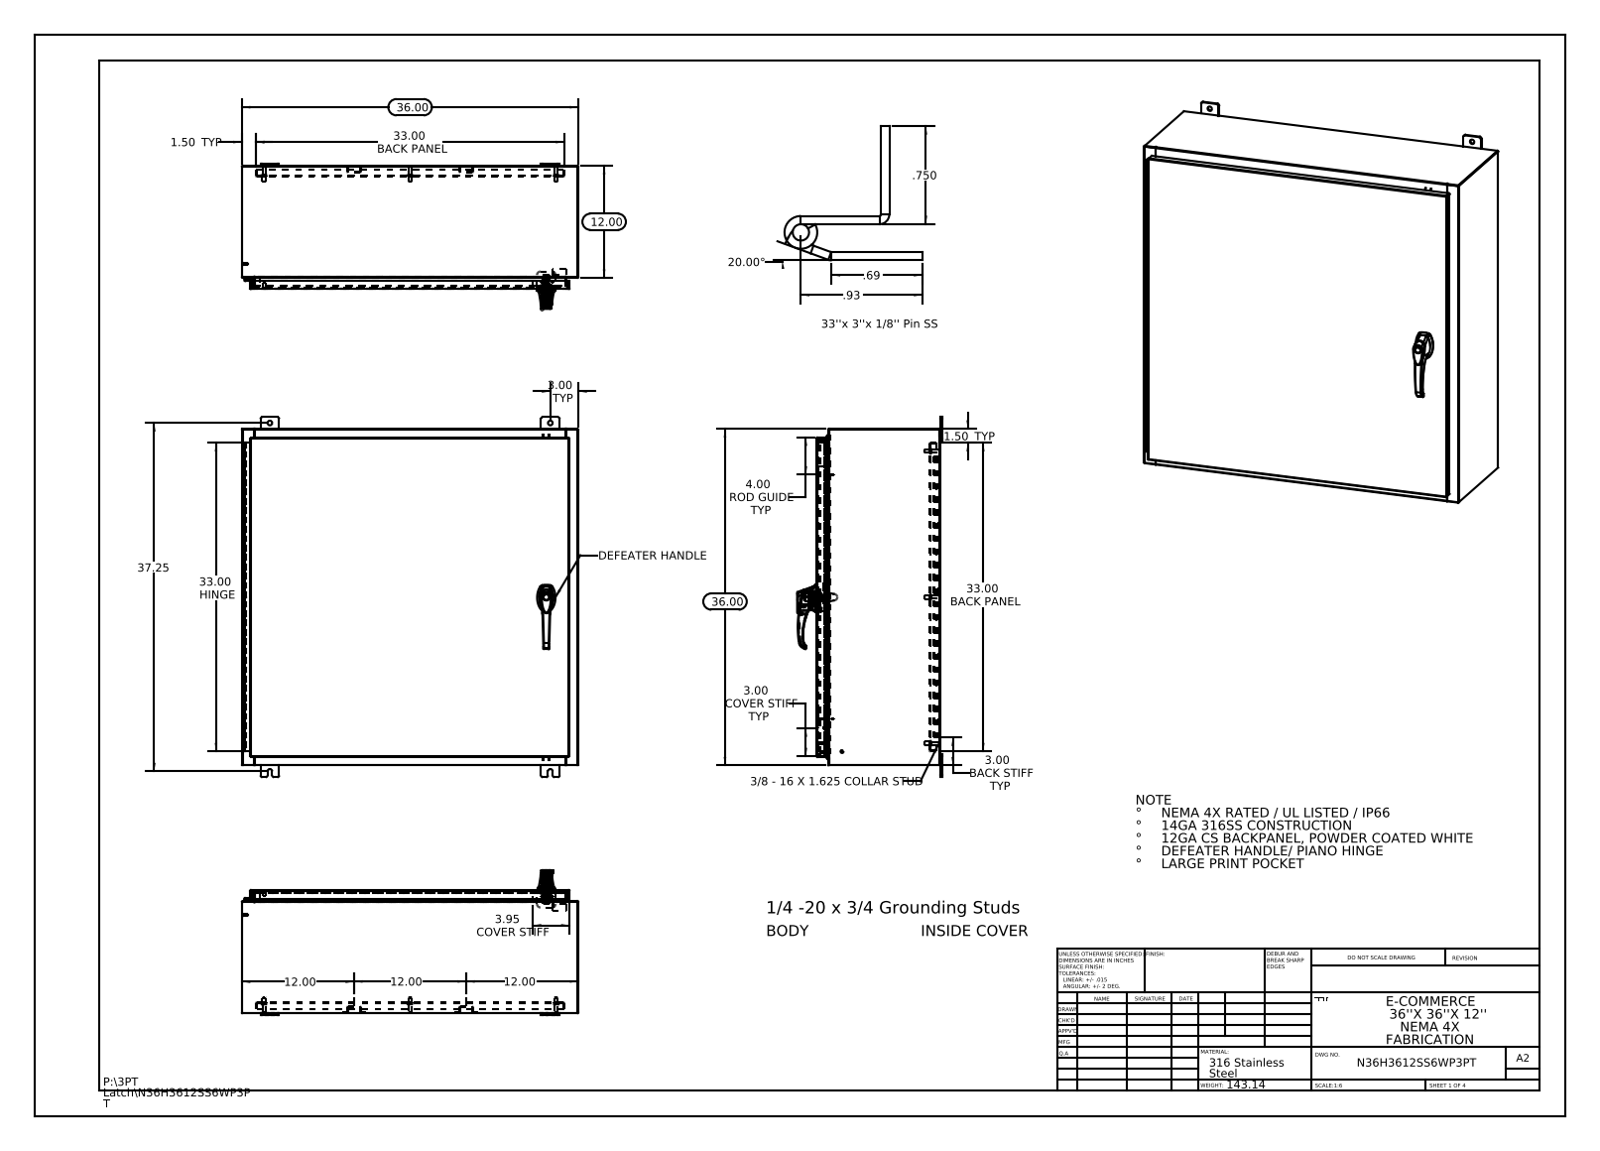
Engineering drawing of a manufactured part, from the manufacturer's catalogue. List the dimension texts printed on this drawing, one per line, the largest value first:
37.25
36.00
36.00
33.00 HINGE
33.00 BACK PANEL
33.00 BACK PANEL
20.00°
12.00
12.00
12.00
12.00
4.00 ROD GUIDE TYP
3.95 COVER STIFF
3.00 TYP
3.00 COVER STIFF TYP
3.00 BACK STIFF TYP
1.50 TYP
1.50 TYP
.93
.750
.69
